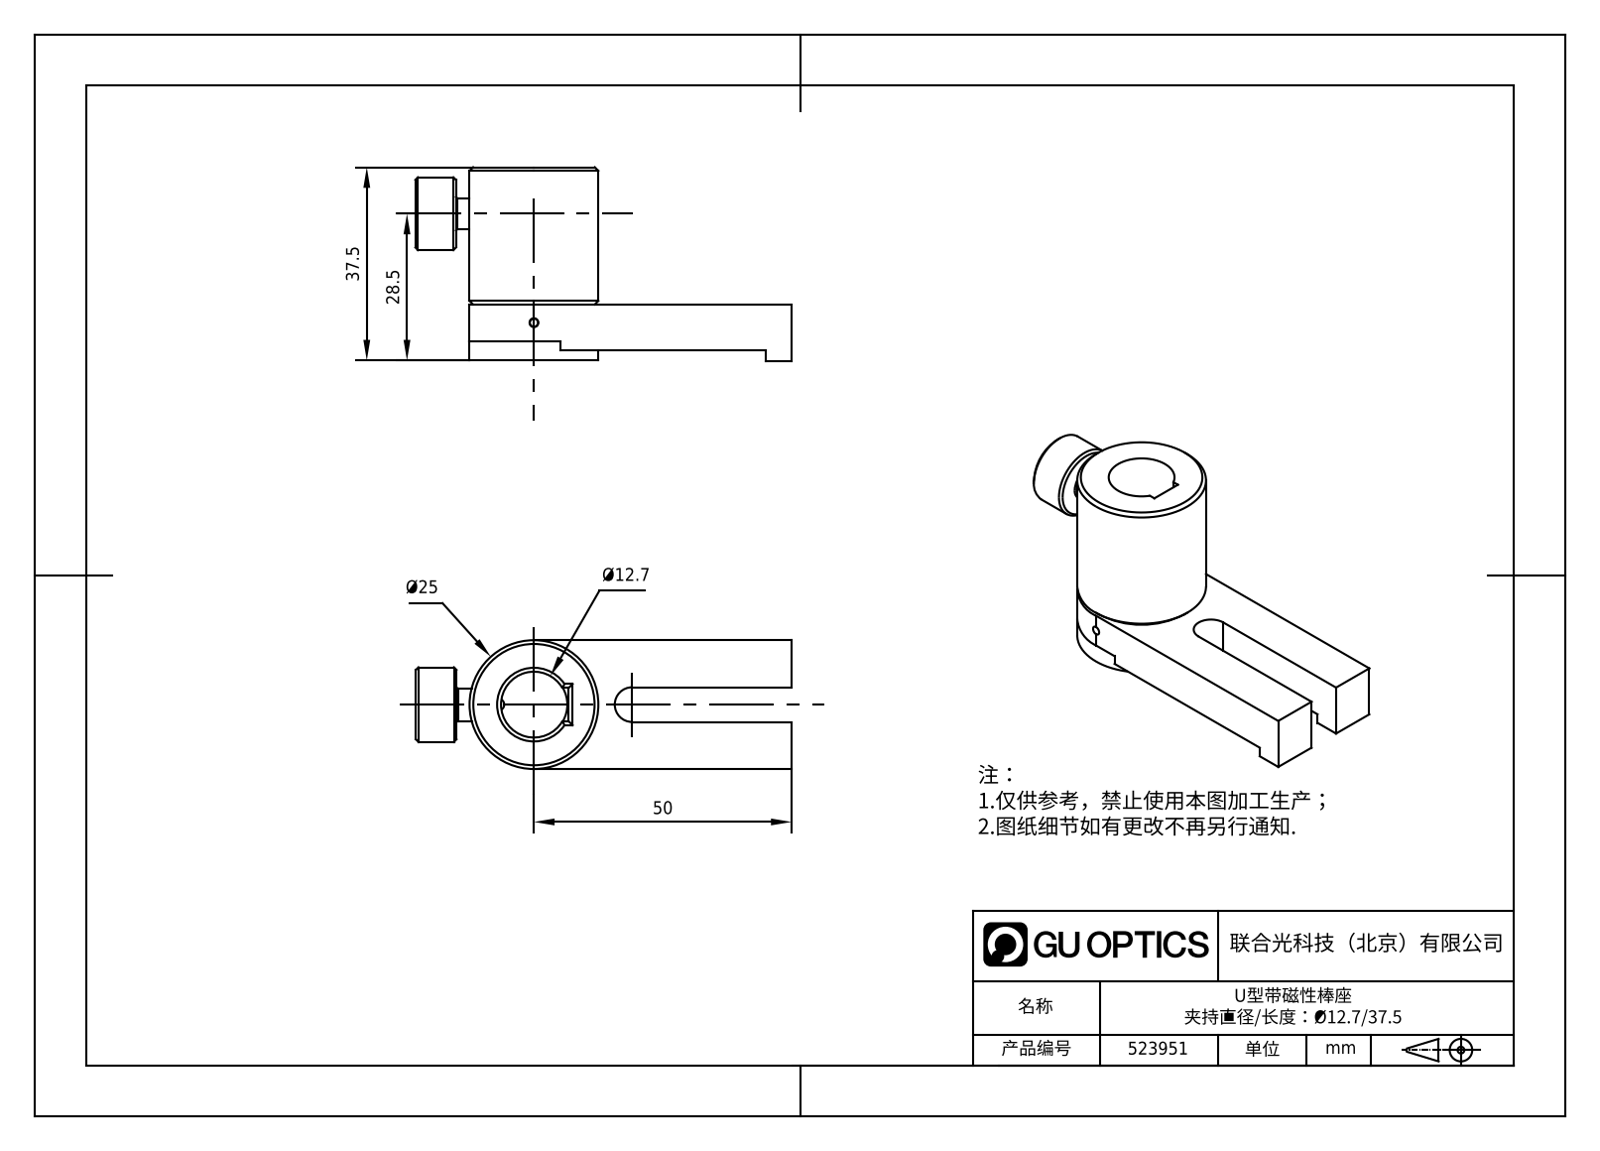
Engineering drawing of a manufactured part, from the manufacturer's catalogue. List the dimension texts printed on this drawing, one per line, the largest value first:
50
37.5
28.5
Ø25
Ø12.7
